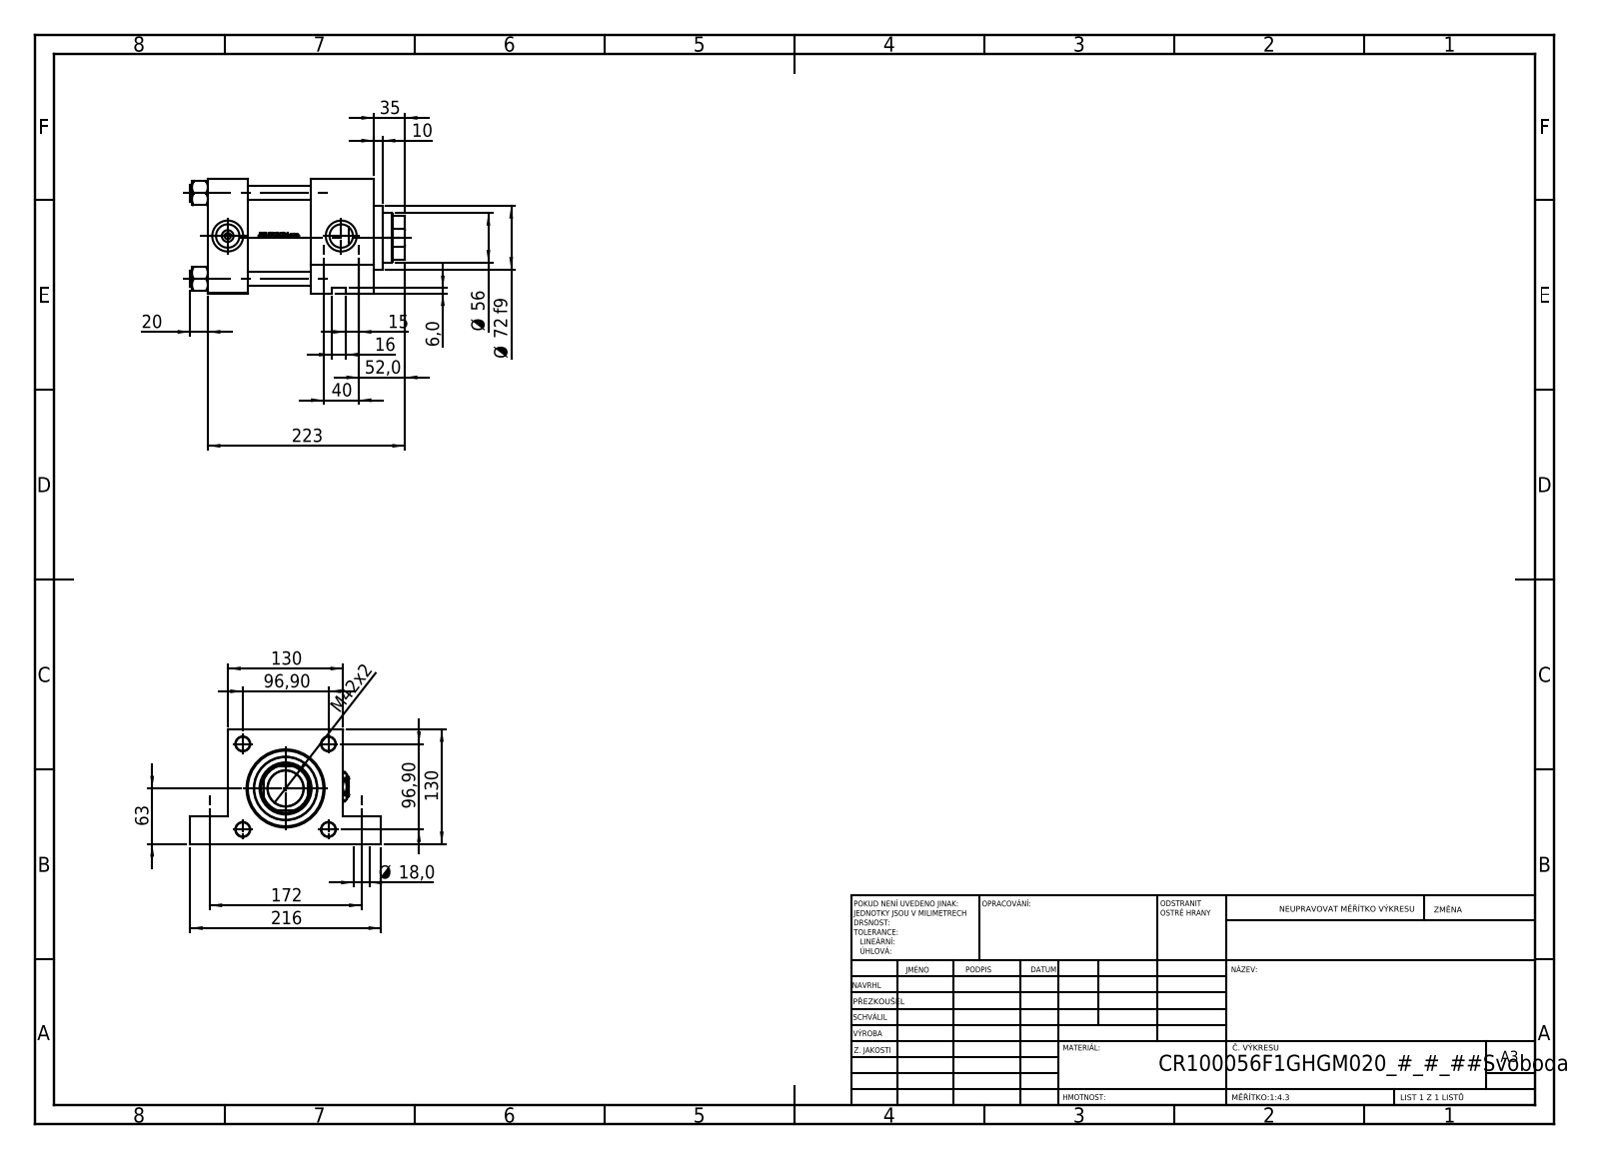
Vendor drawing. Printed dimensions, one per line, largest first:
223
216
172
130
130
96,90
96,90
Ø 72 f9
63
Ø 56
52,0
M42x2
40
35
20
Ø 18,0
16
15
10
6,0
